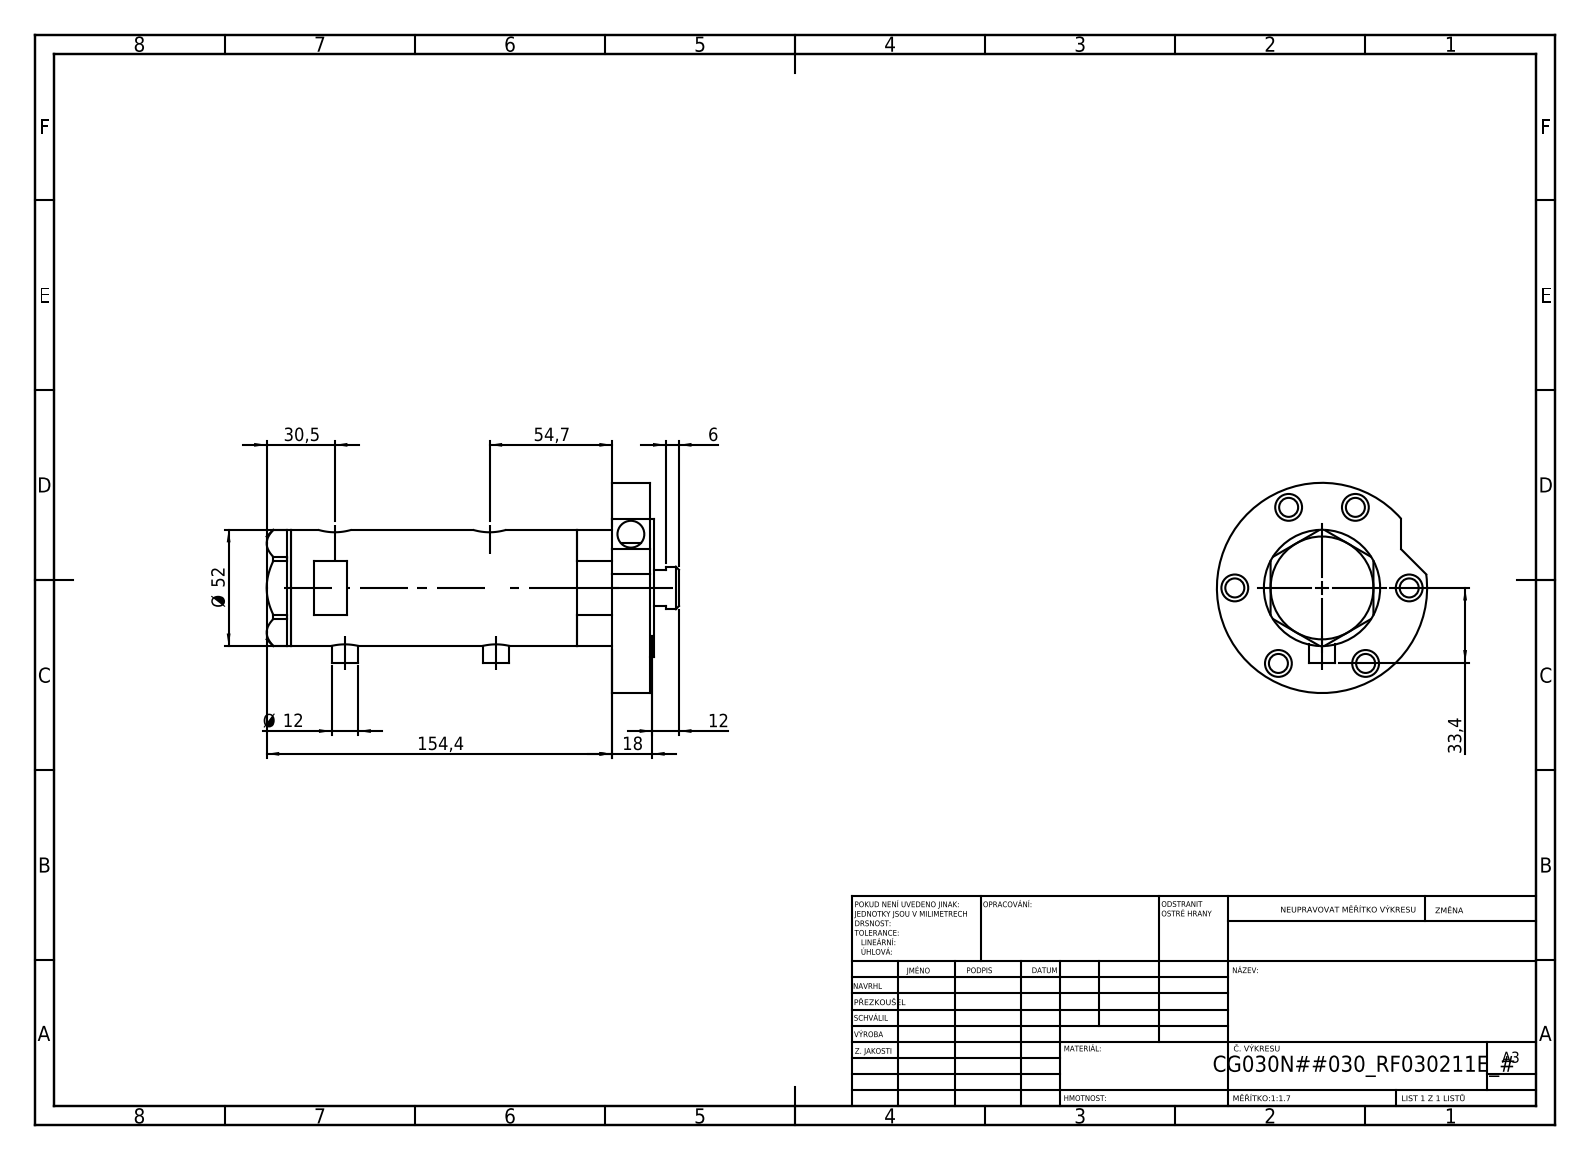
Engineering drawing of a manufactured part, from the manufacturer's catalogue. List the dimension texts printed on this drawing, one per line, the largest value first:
154,4
54,7
Ø 52
33,4
30,5
18
12
Ø 12
6
